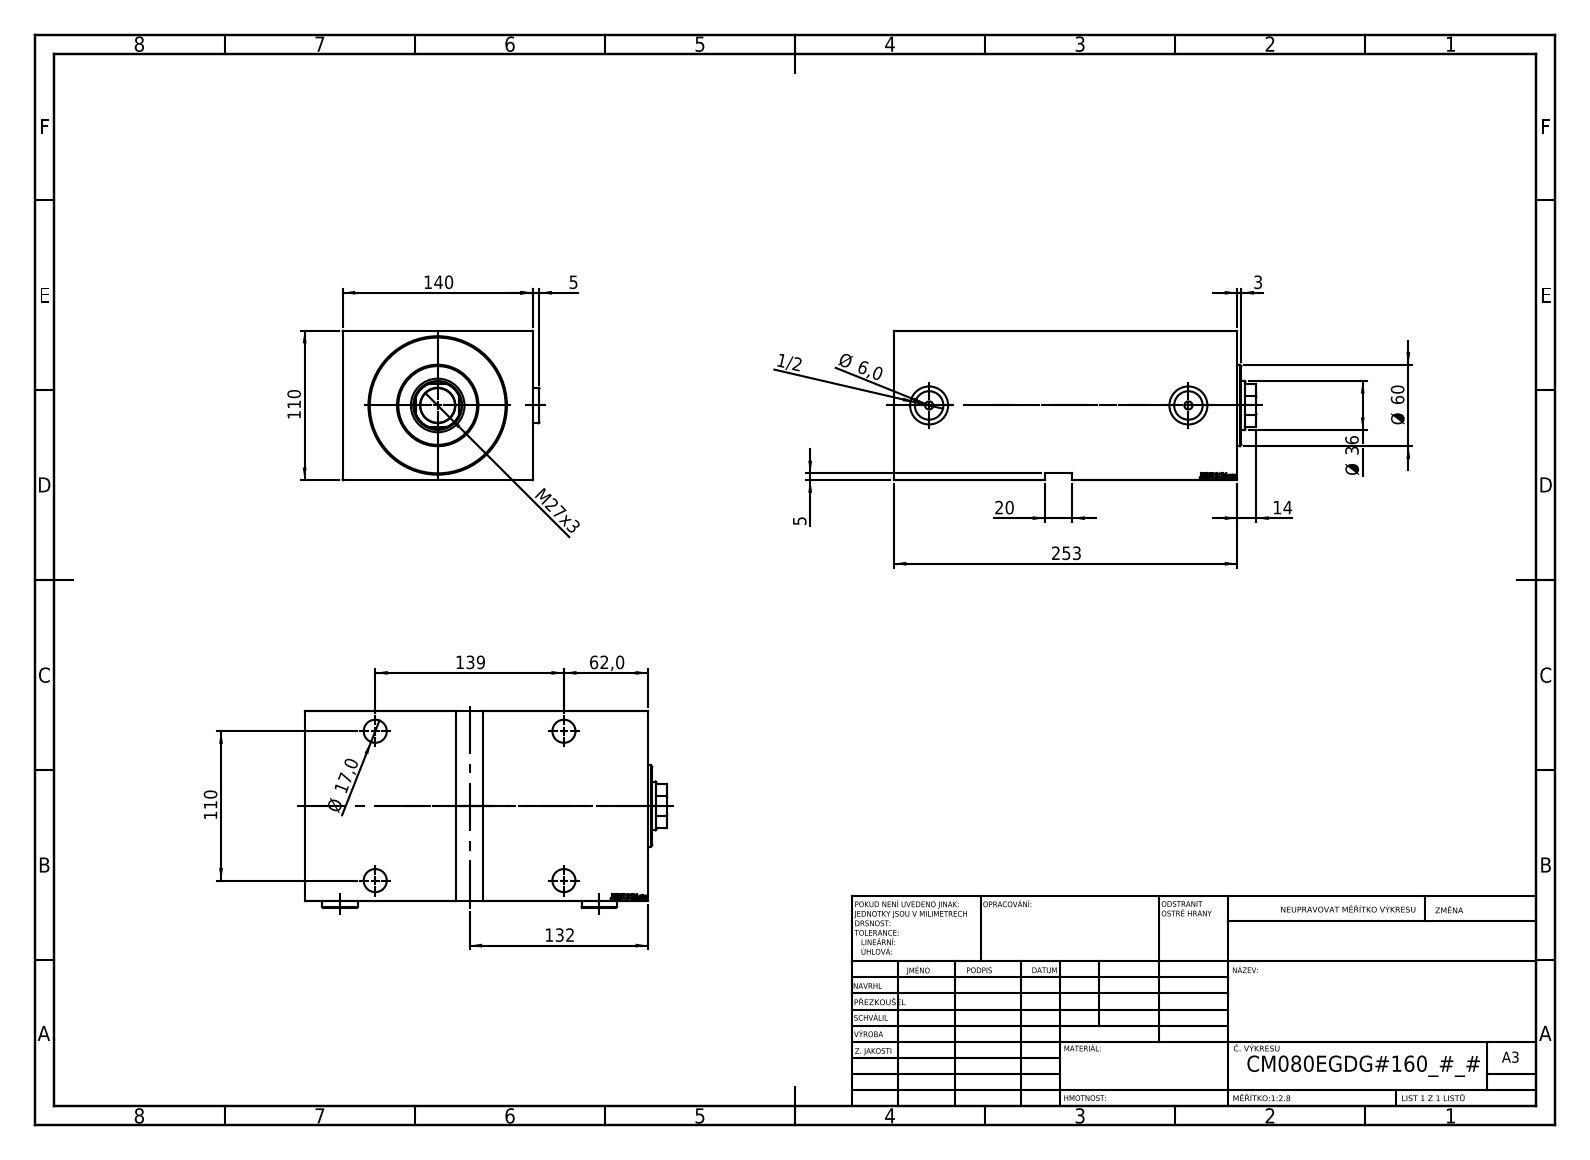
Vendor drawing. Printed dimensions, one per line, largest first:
253
140
139
132
110
110
62,0
Ø 60
Ø 36
M27x3
20
Ø 17,0
14
Ø 6,0
5
5
3
1/2
